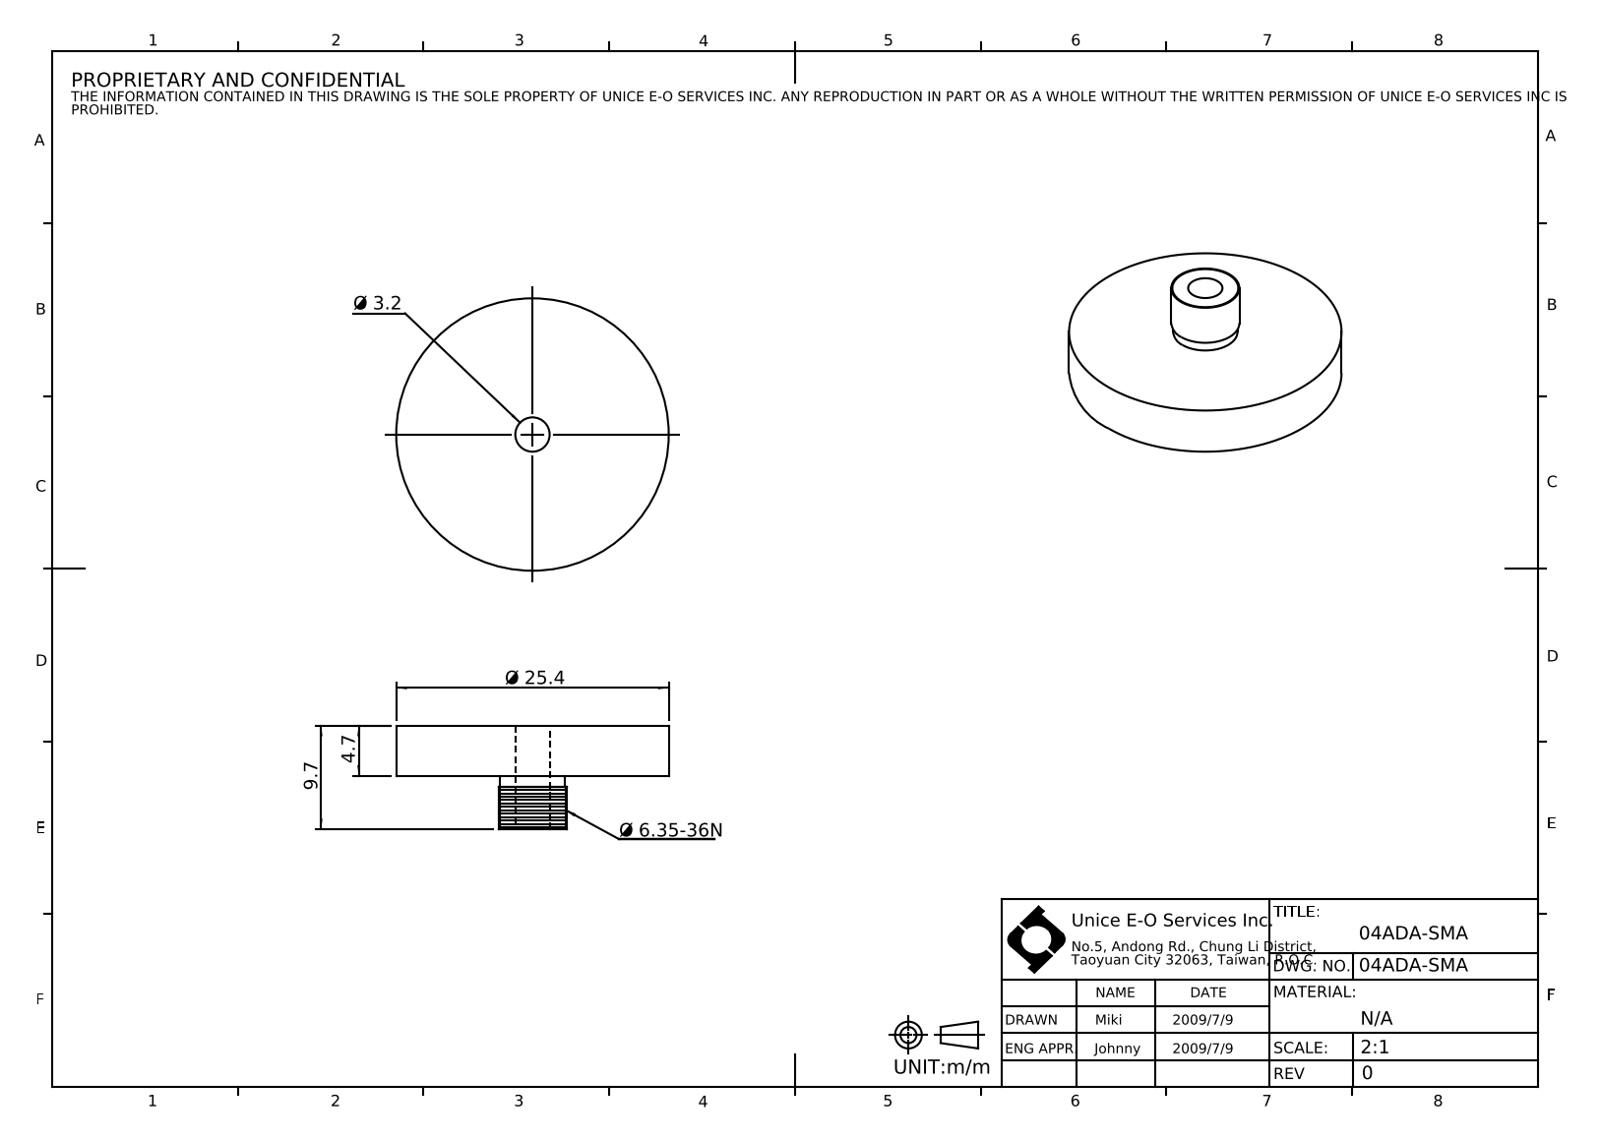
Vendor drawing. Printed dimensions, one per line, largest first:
Ø 25.4
9.7
4.7
Ø 3.2
